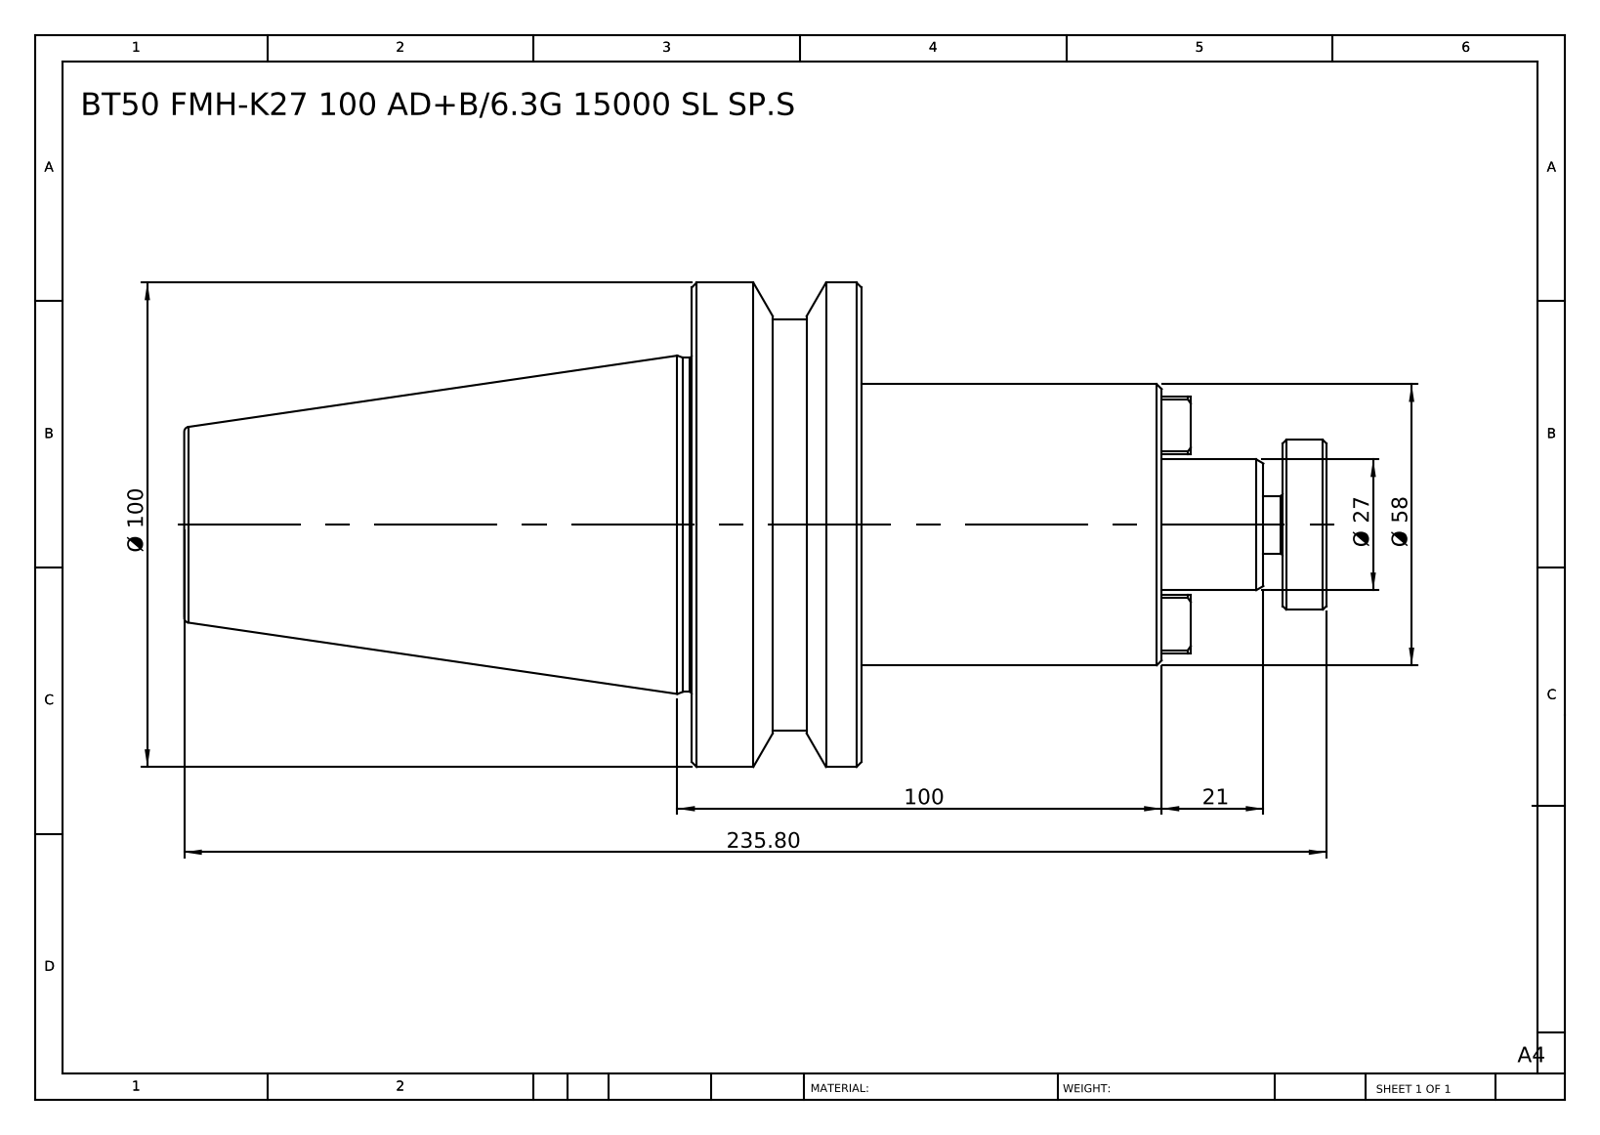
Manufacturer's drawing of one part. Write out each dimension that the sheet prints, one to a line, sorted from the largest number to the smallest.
235.80
100
Ø 100
Ø 58
Ø 27
21
